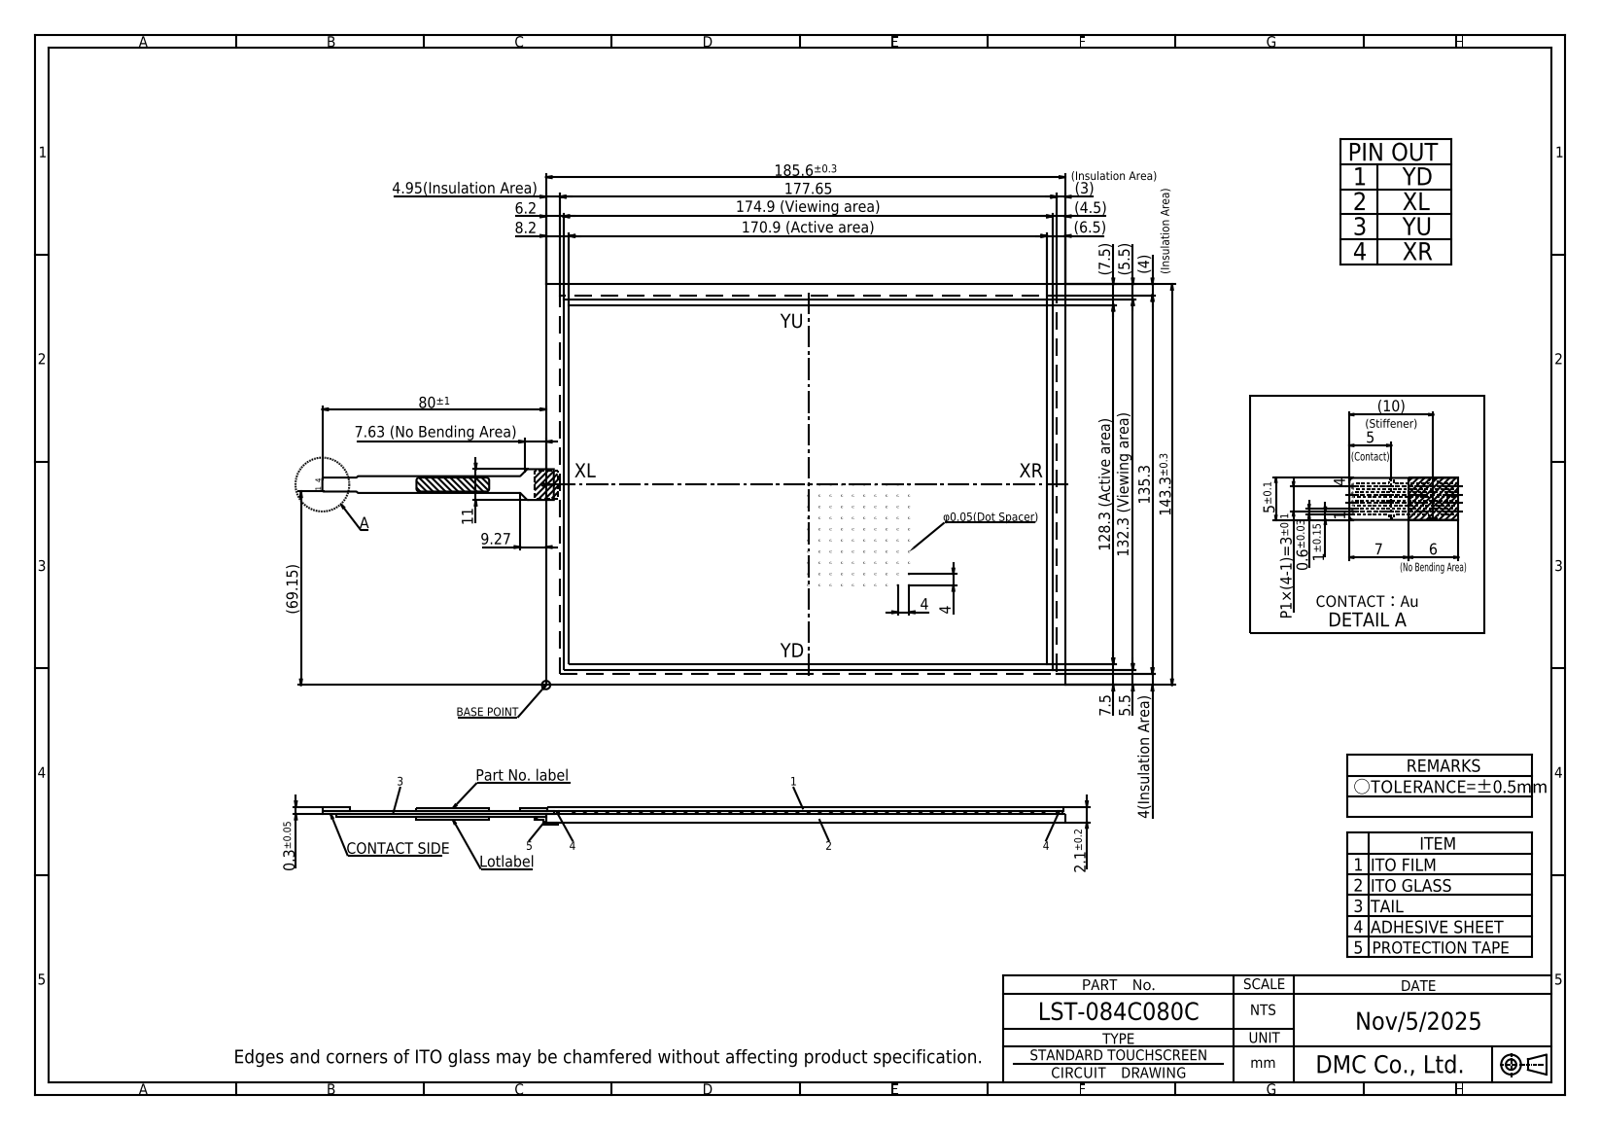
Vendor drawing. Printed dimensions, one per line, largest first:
185.6±0.3
177.65
174.9 (Viewing area)
170.9 (Active area)
143.3±0.3
135.3
132.3 (Viewing area)
128.3 (Active area)
80±1
(69.15)
11
(10)
9.27
8.2
7.63 (No Bending Area)
(7.5)
7.5
7
(6.5)
6.2
6
(5.5)
5.5
5
5±0.1
4.95(Insulation Area)
(4.5)
(4)
4(Insulation Area)
4
4
(3)
2.1±0.2
P1×(4-1)=3±0.1
1±0.15
0.6±0.03
0.3±0.05
